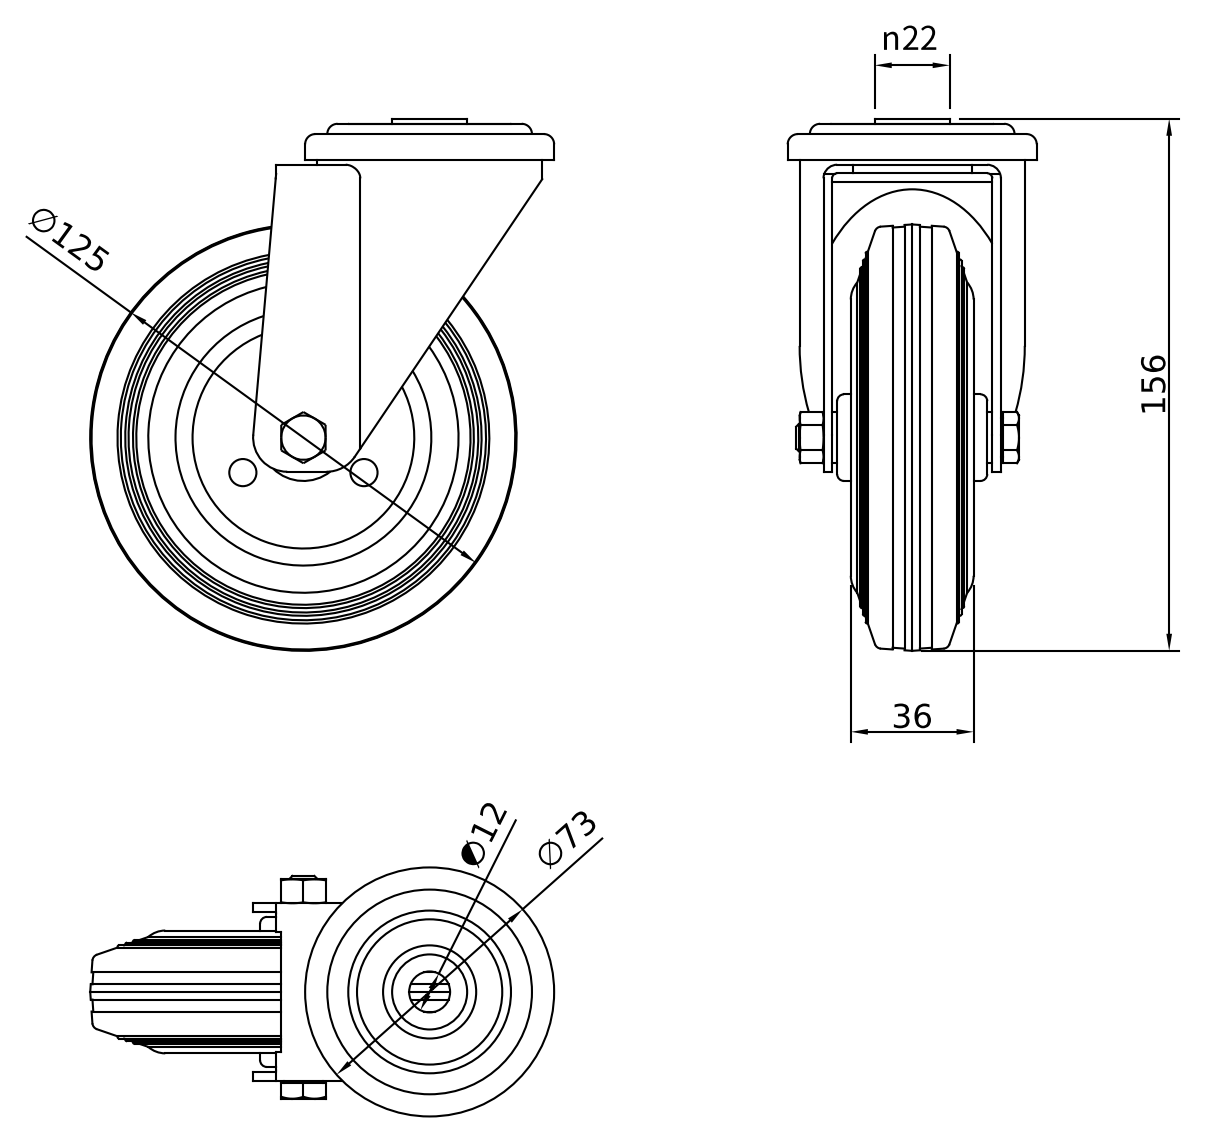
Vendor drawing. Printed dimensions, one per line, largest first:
156
∅125
∅73
36
n22
∅12
